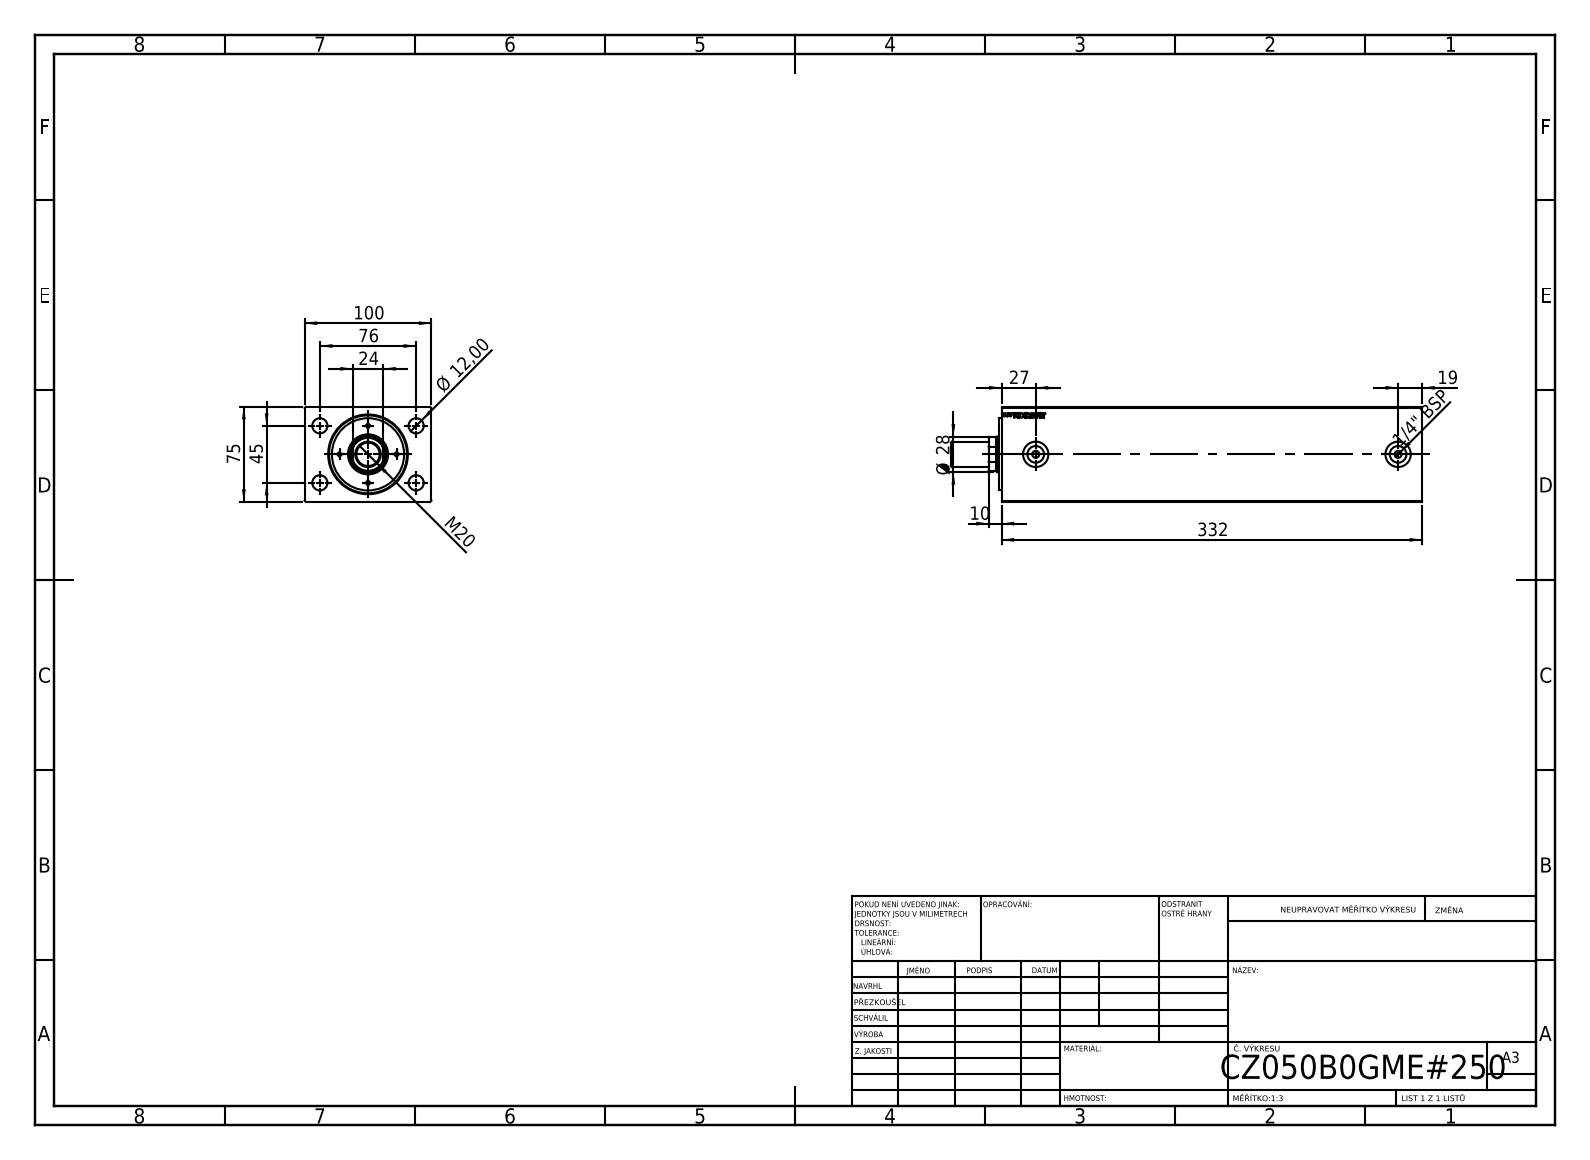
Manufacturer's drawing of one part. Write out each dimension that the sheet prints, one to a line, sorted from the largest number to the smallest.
332
100
76
75
45
Ø 28
27
24
M20
19
Ø 12,00
10
1/4" BSP
